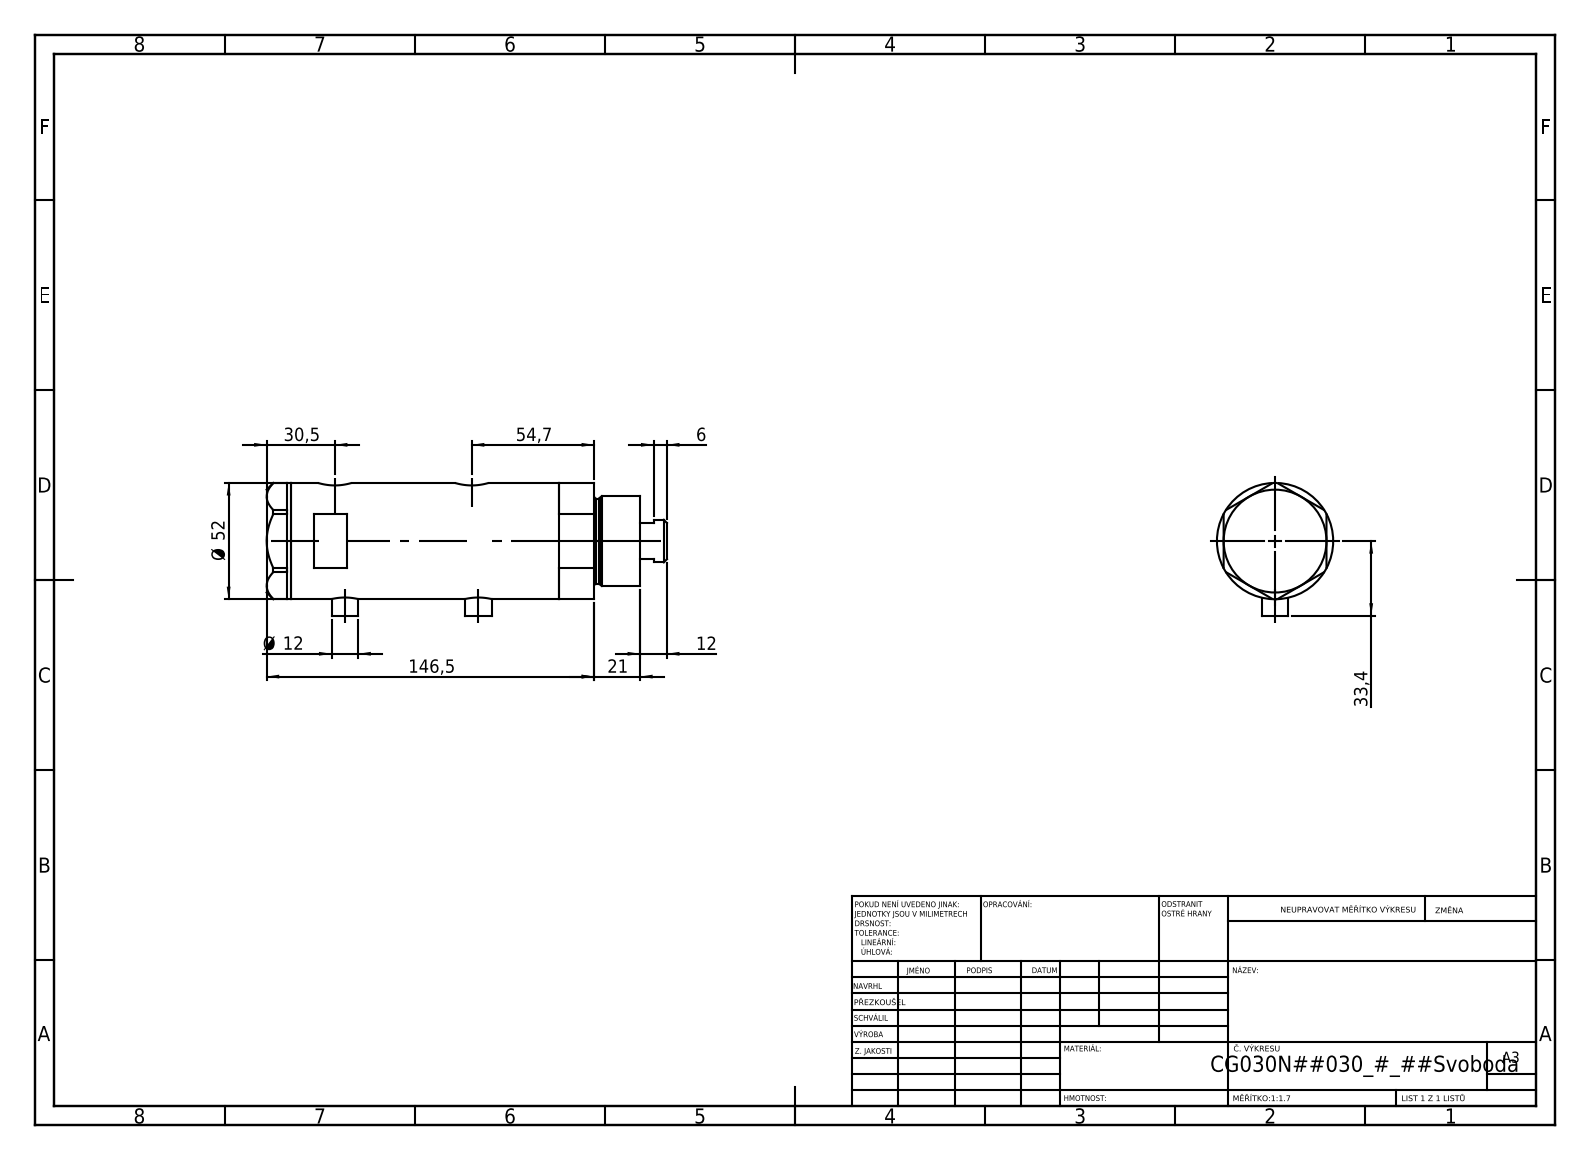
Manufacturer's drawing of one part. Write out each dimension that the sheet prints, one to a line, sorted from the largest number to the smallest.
146,5
54,7
Ø 52
33,4
30,5
21
12
Ø 12
6
